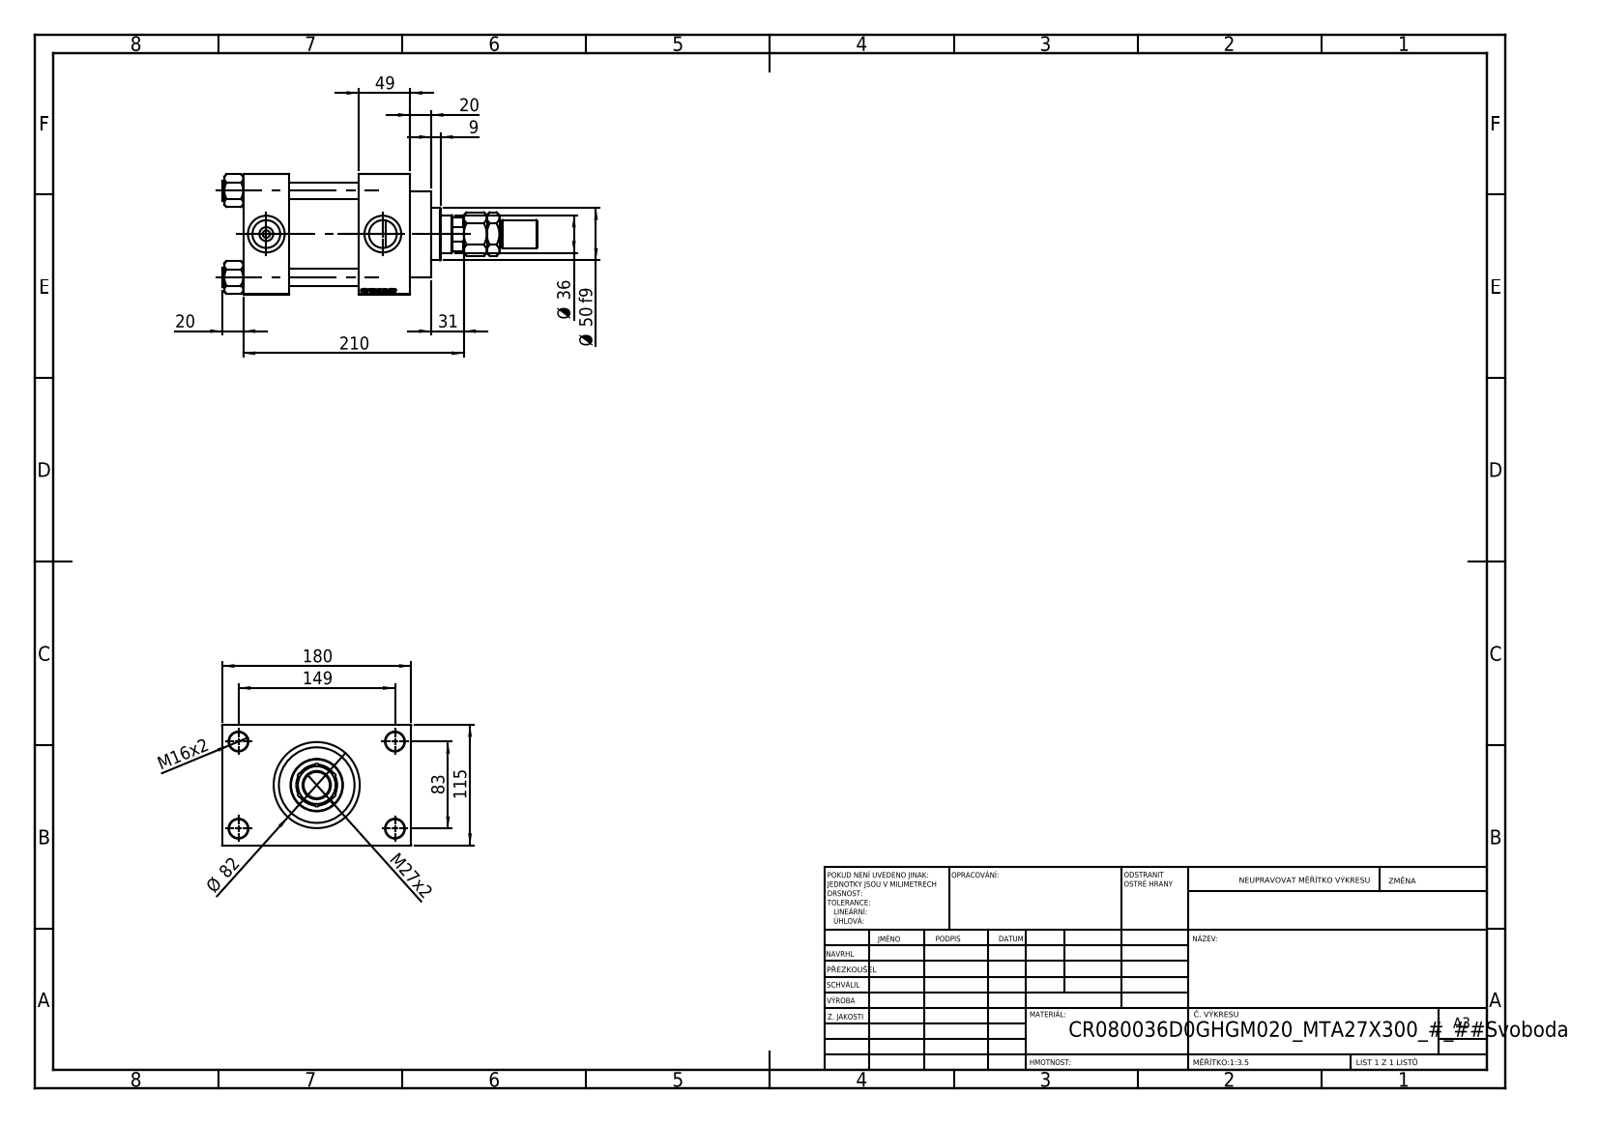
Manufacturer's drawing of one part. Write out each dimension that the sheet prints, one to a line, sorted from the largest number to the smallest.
210
180
149
115
83
Ø 82
Ø 50 f9
49
Ø 36
31
M27x2
20
20
M16x2
9
